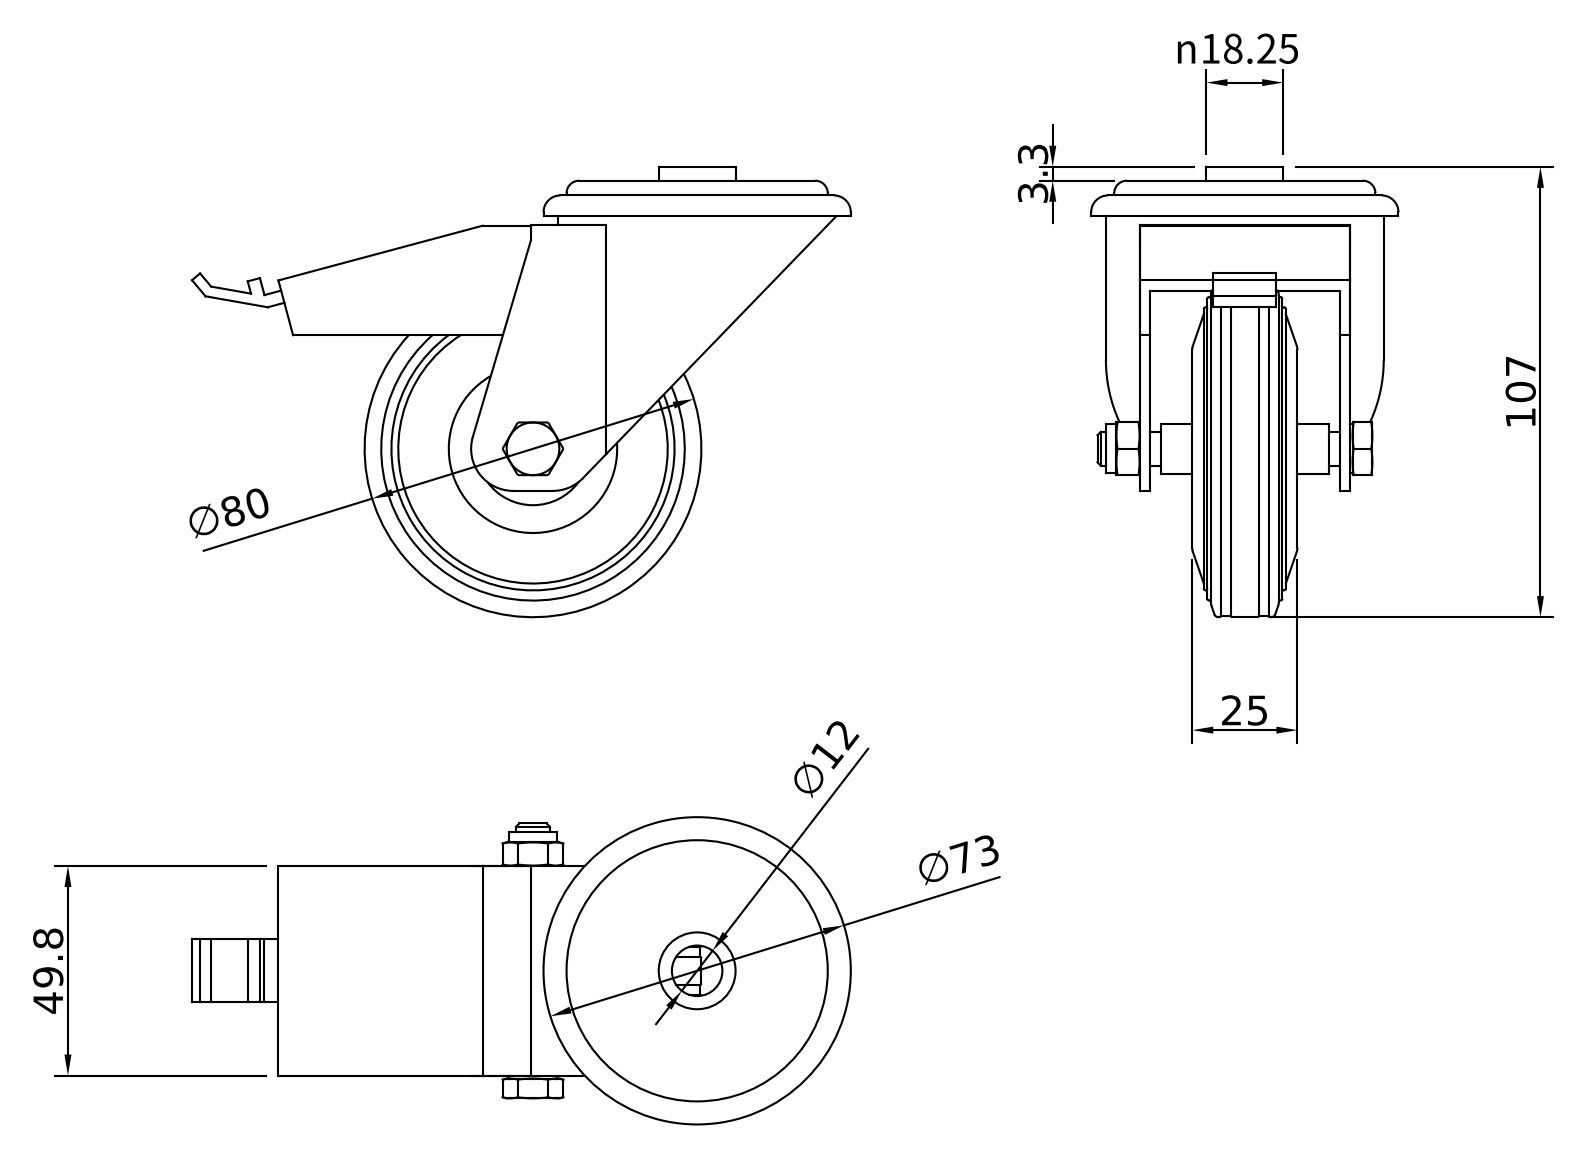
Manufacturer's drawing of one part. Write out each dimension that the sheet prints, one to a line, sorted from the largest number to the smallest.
107
∅80
∅73
49.8
25
n18.25
∅12
3.3
